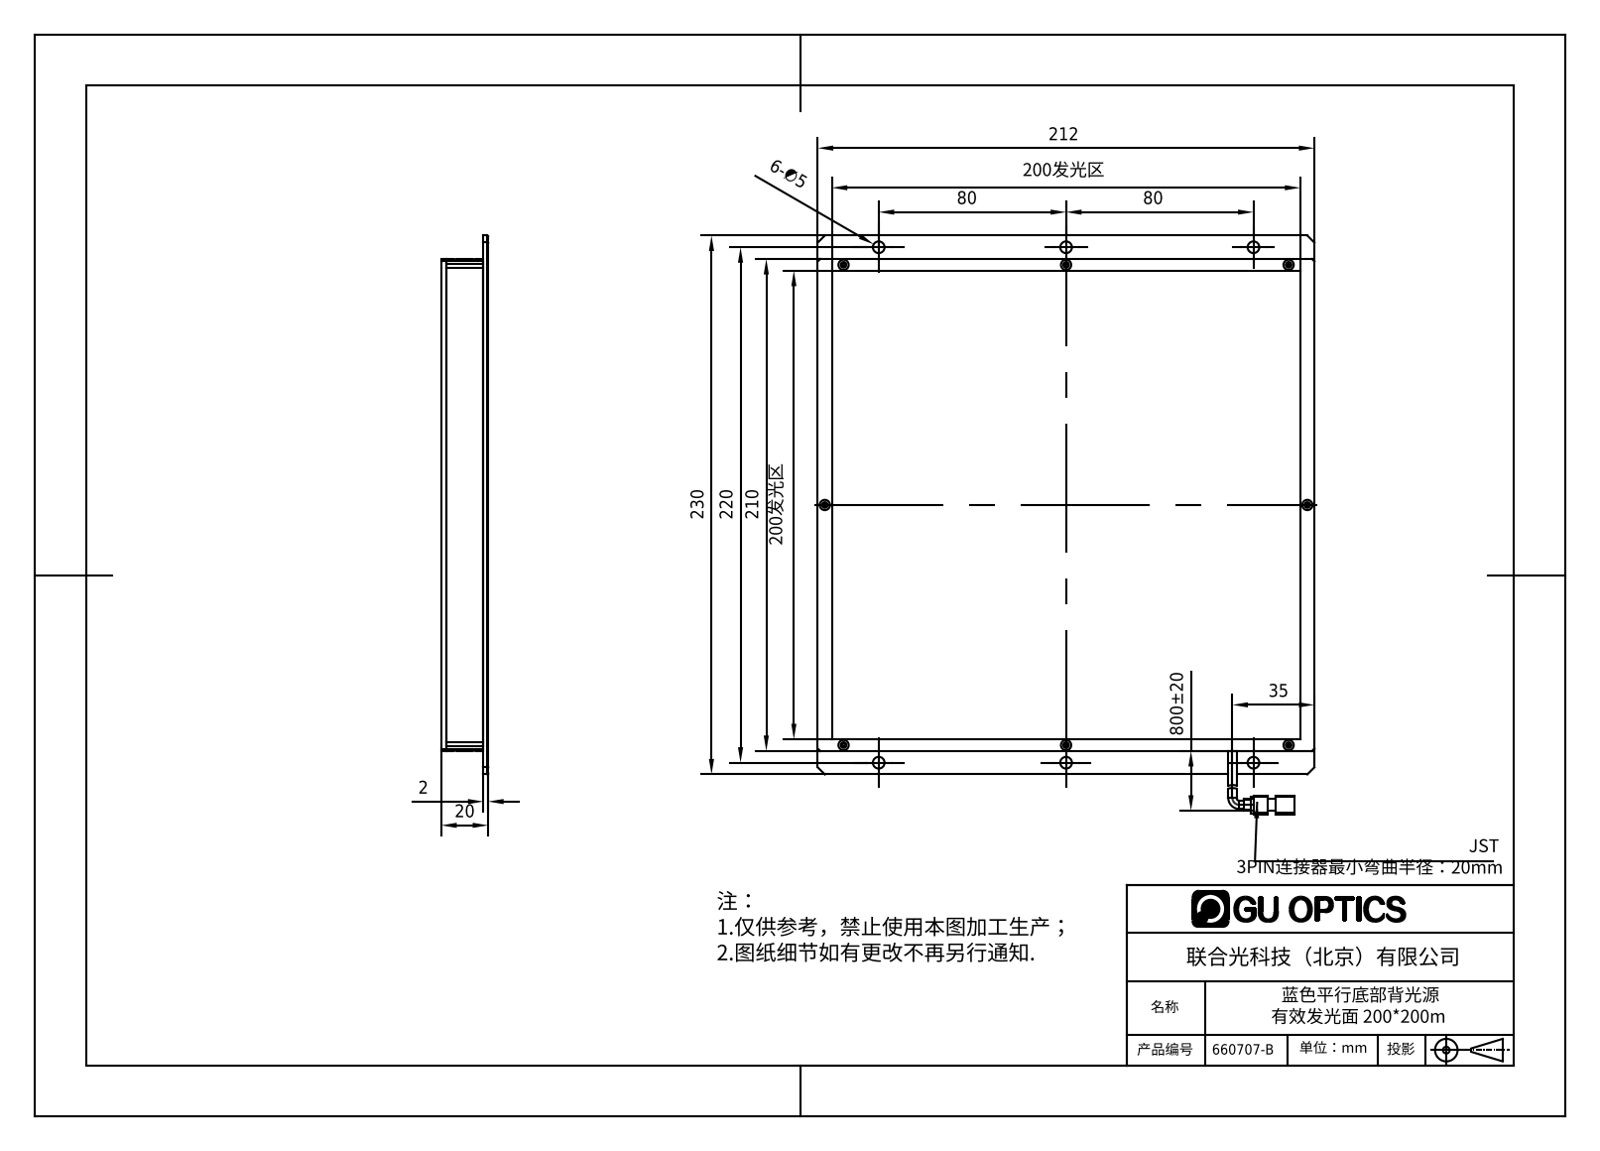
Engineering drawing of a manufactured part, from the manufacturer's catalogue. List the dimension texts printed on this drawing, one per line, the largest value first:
800±20
230
220
212
210
200发光区
200发光区
80
80
35
20
6-∅5
2
